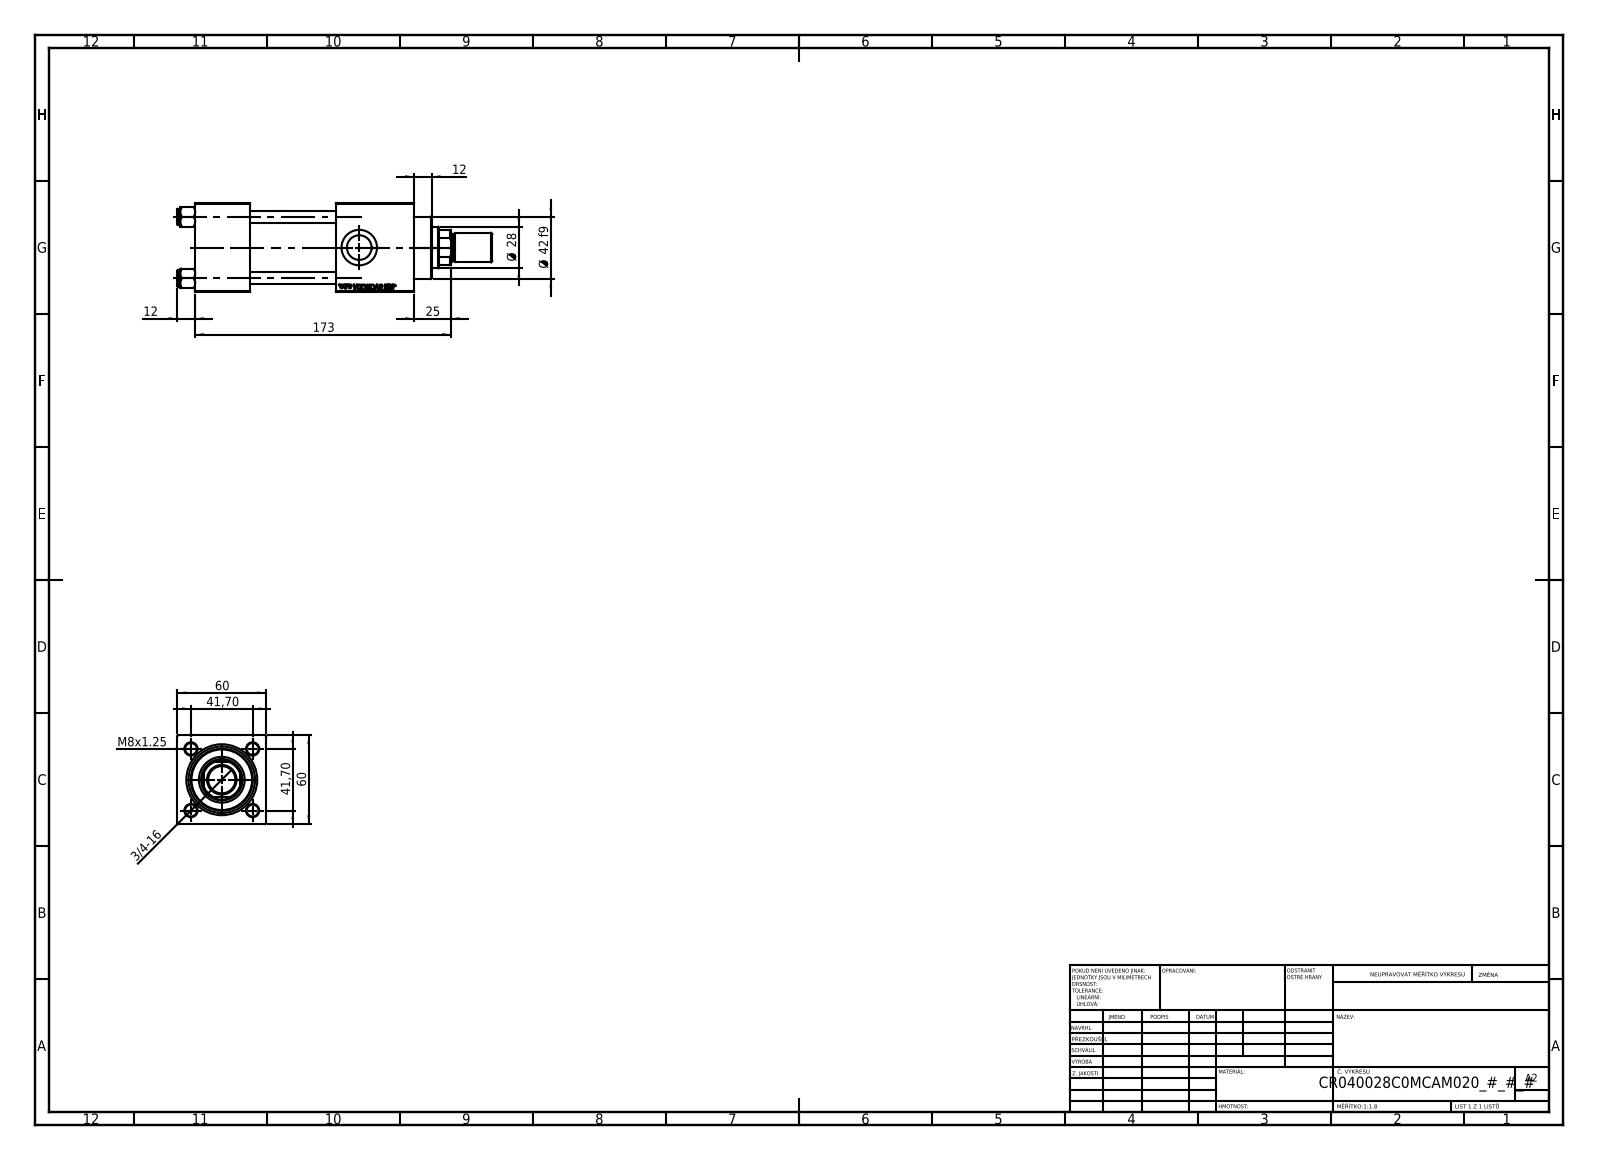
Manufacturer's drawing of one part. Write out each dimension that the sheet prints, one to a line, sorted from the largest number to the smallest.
173
60
60
Ø 42 f9
41,70
41,70
Ø 28
25
12
12
M8x1.25
3/4-16
